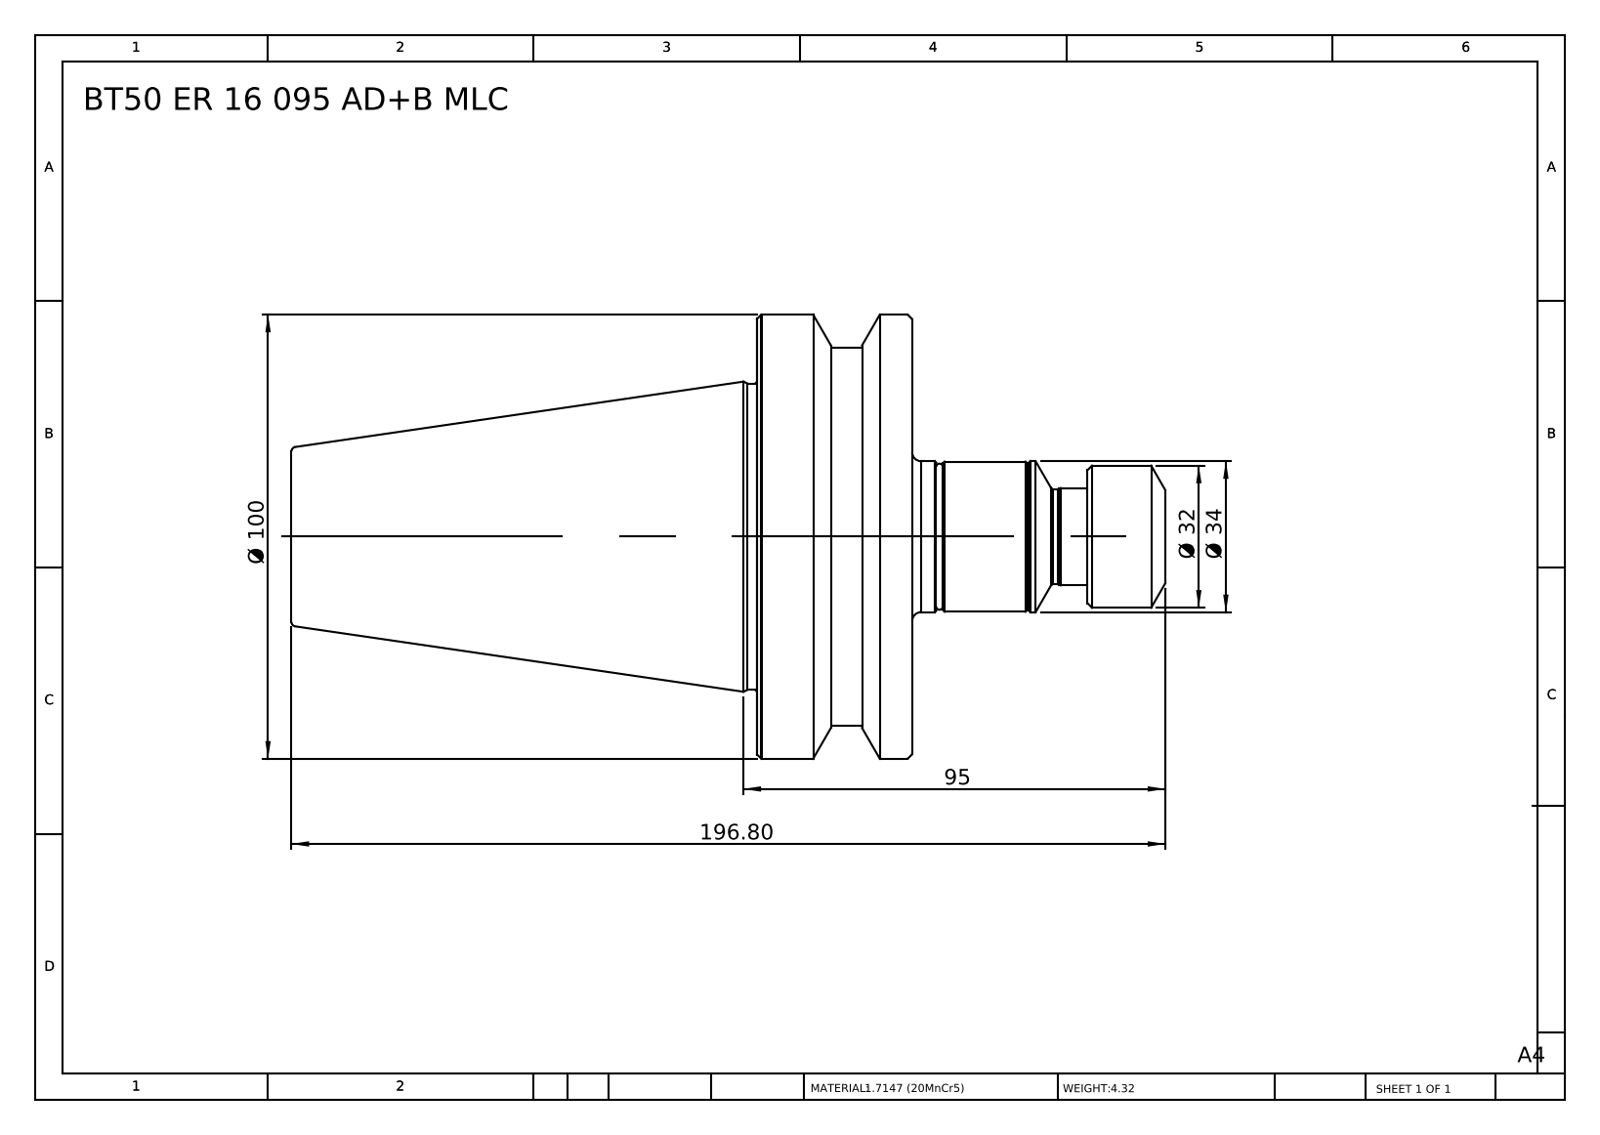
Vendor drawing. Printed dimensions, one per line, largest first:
196.80
Ø 100
95
Ø 34
Ø 32
